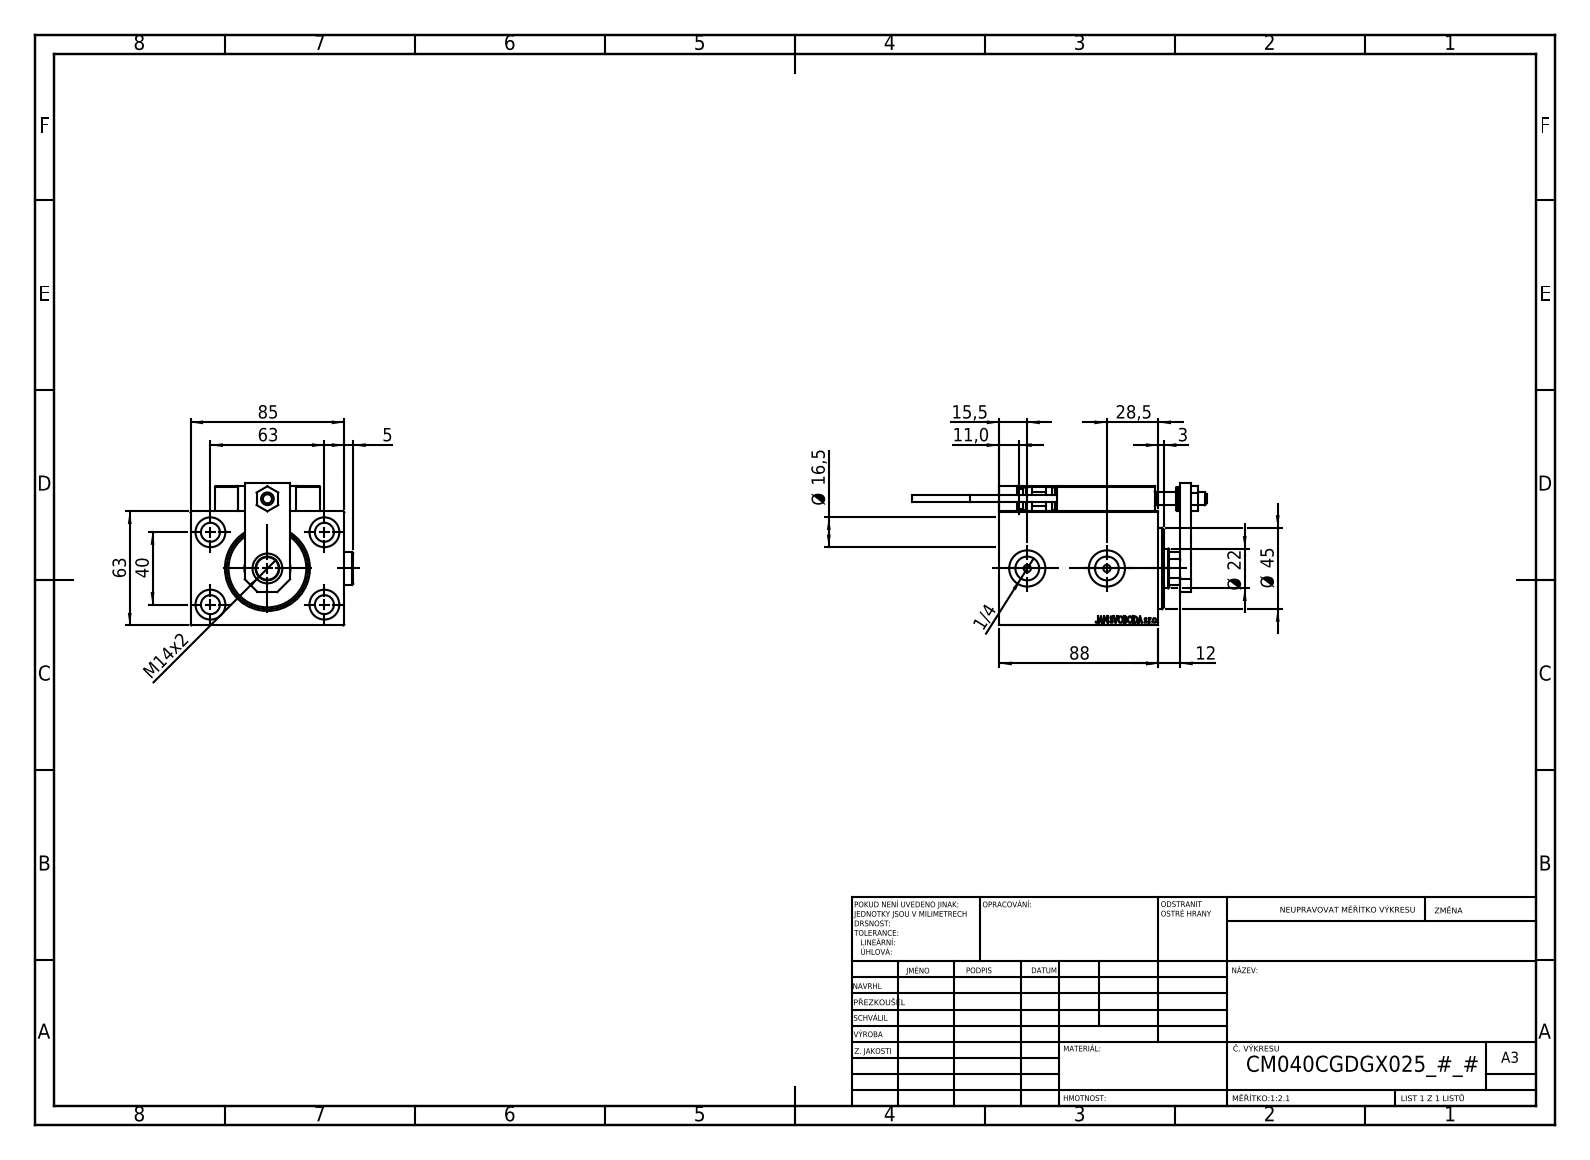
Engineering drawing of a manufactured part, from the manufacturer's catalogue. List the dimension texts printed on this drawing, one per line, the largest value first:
88
85
63
63
Ø 45
40
28,5
Ø 22
Ø 16,5
15,5
M14x2
12
11,0
5
3
1/4
